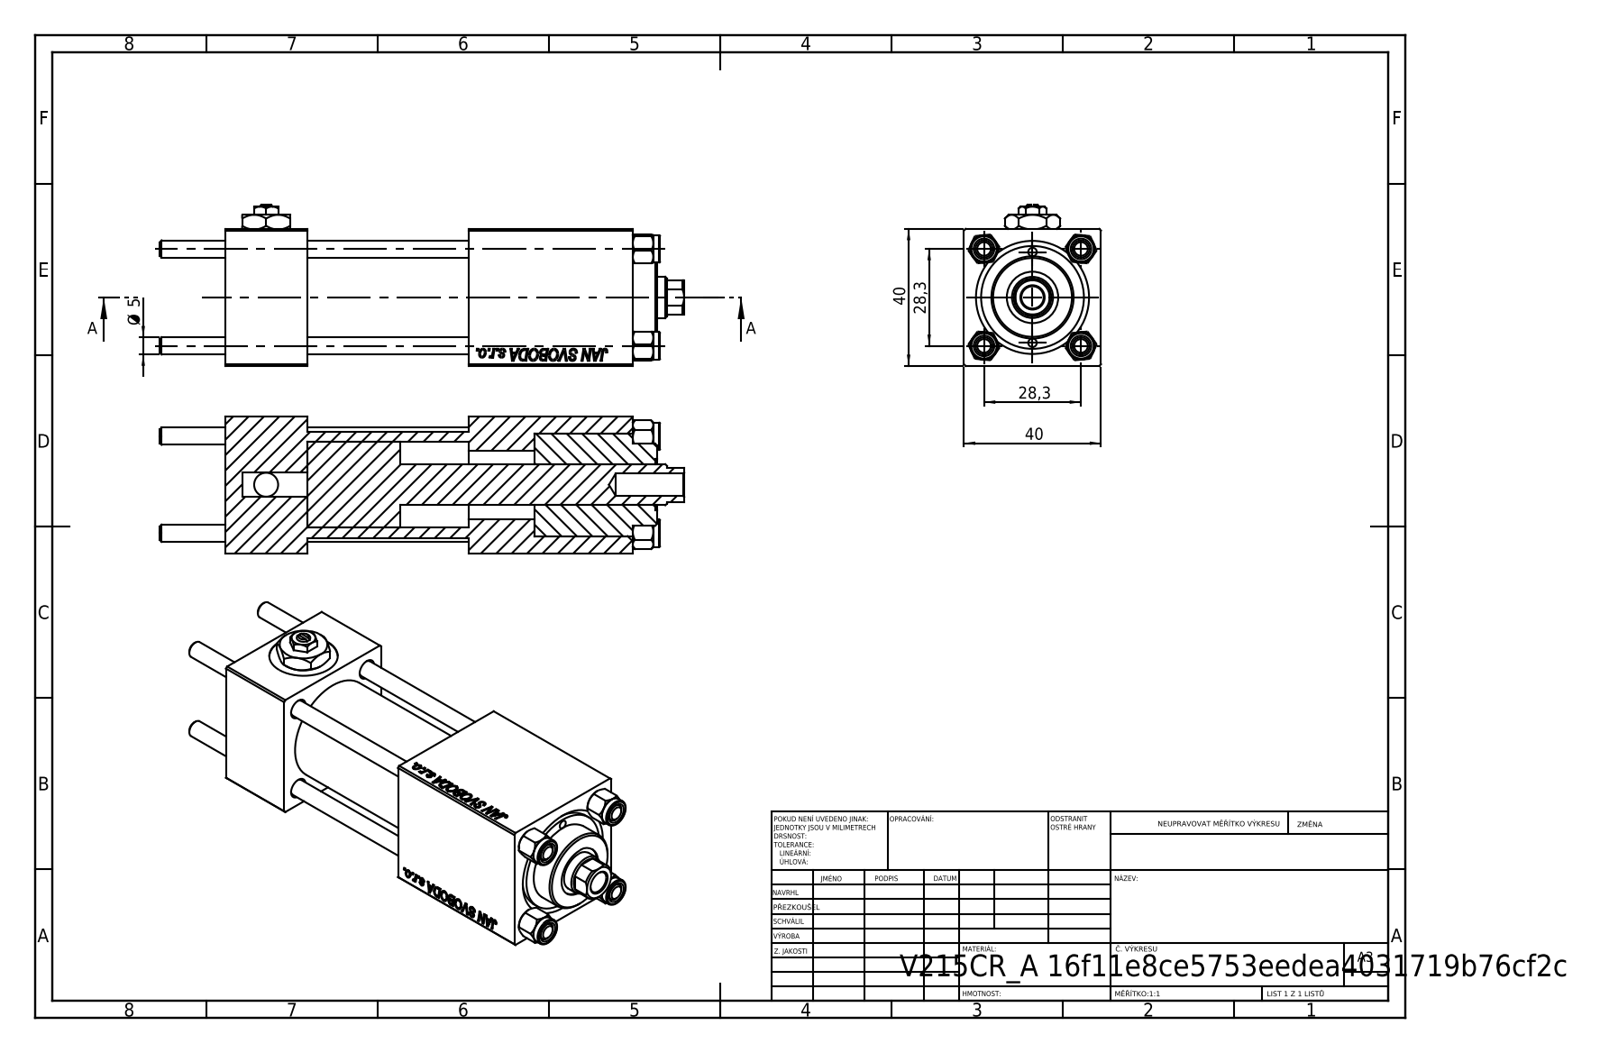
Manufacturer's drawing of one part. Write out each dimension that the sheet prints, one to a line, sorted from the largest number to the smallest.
40
40
28,3
28,3
Ø 5
